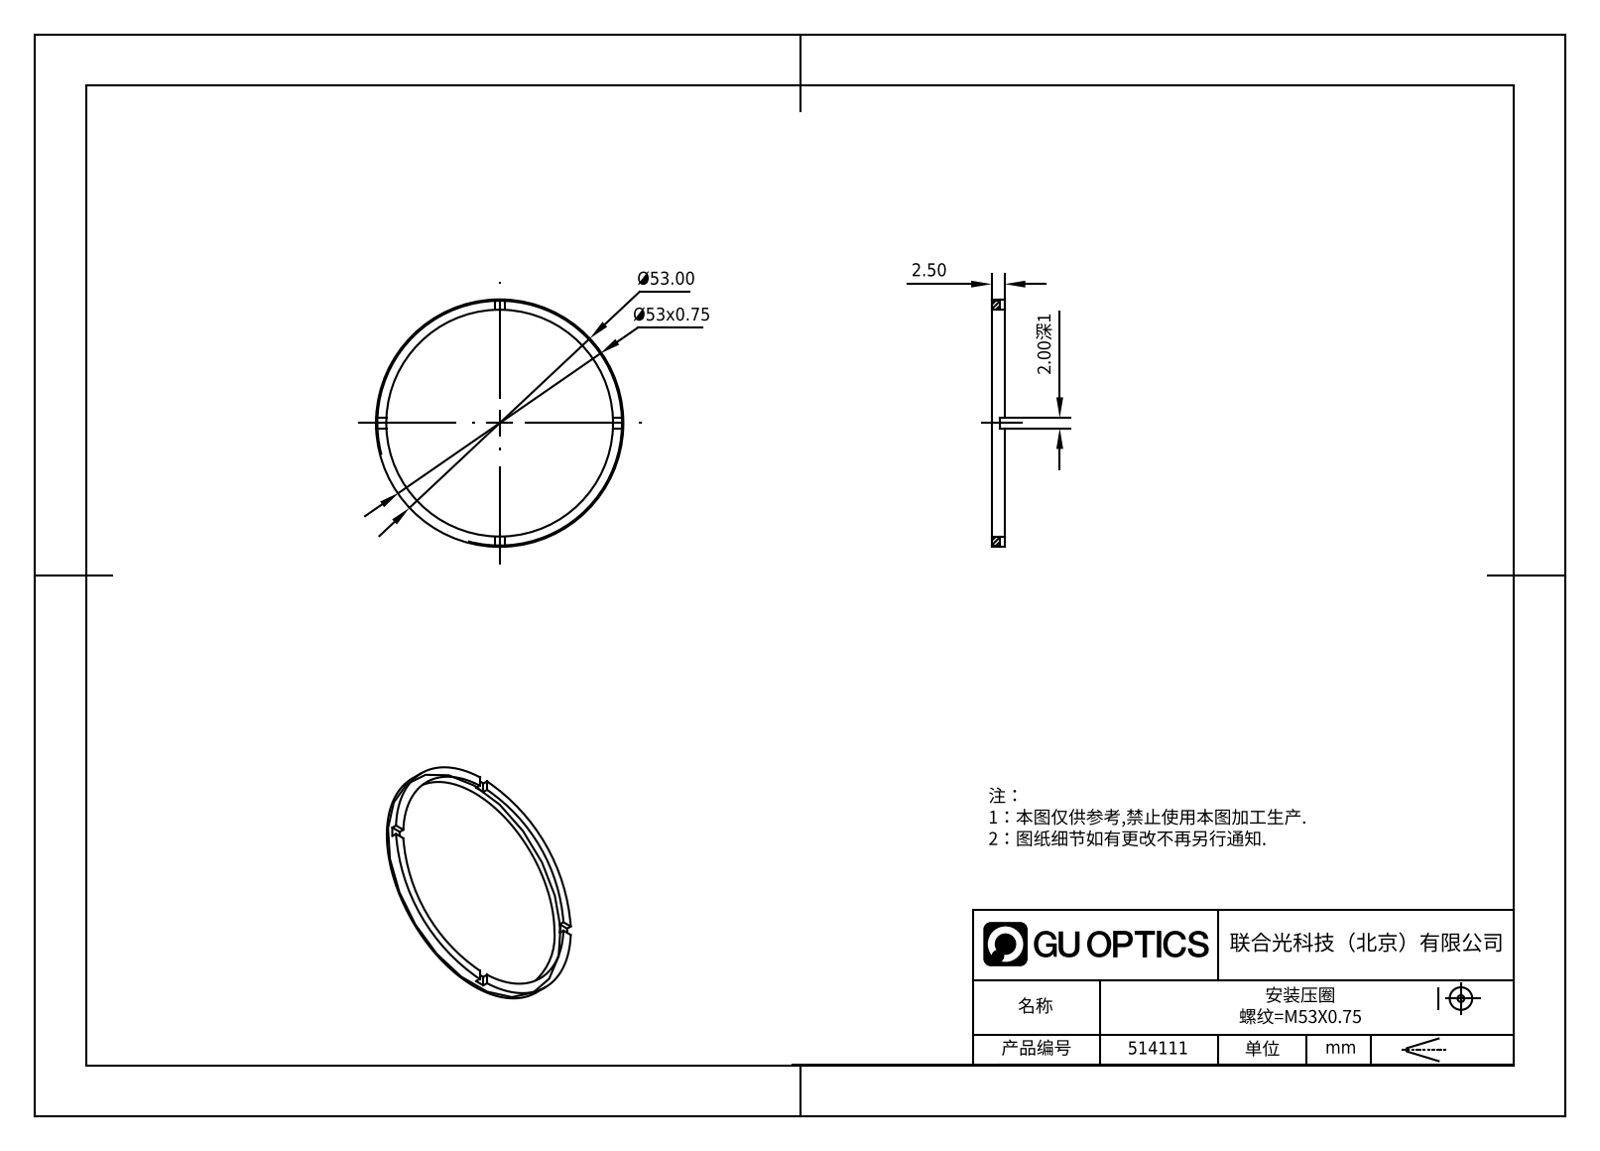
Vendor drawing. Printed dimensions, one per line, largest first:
Ø53.00
Ø53x0.75
2.50
2.00深1
